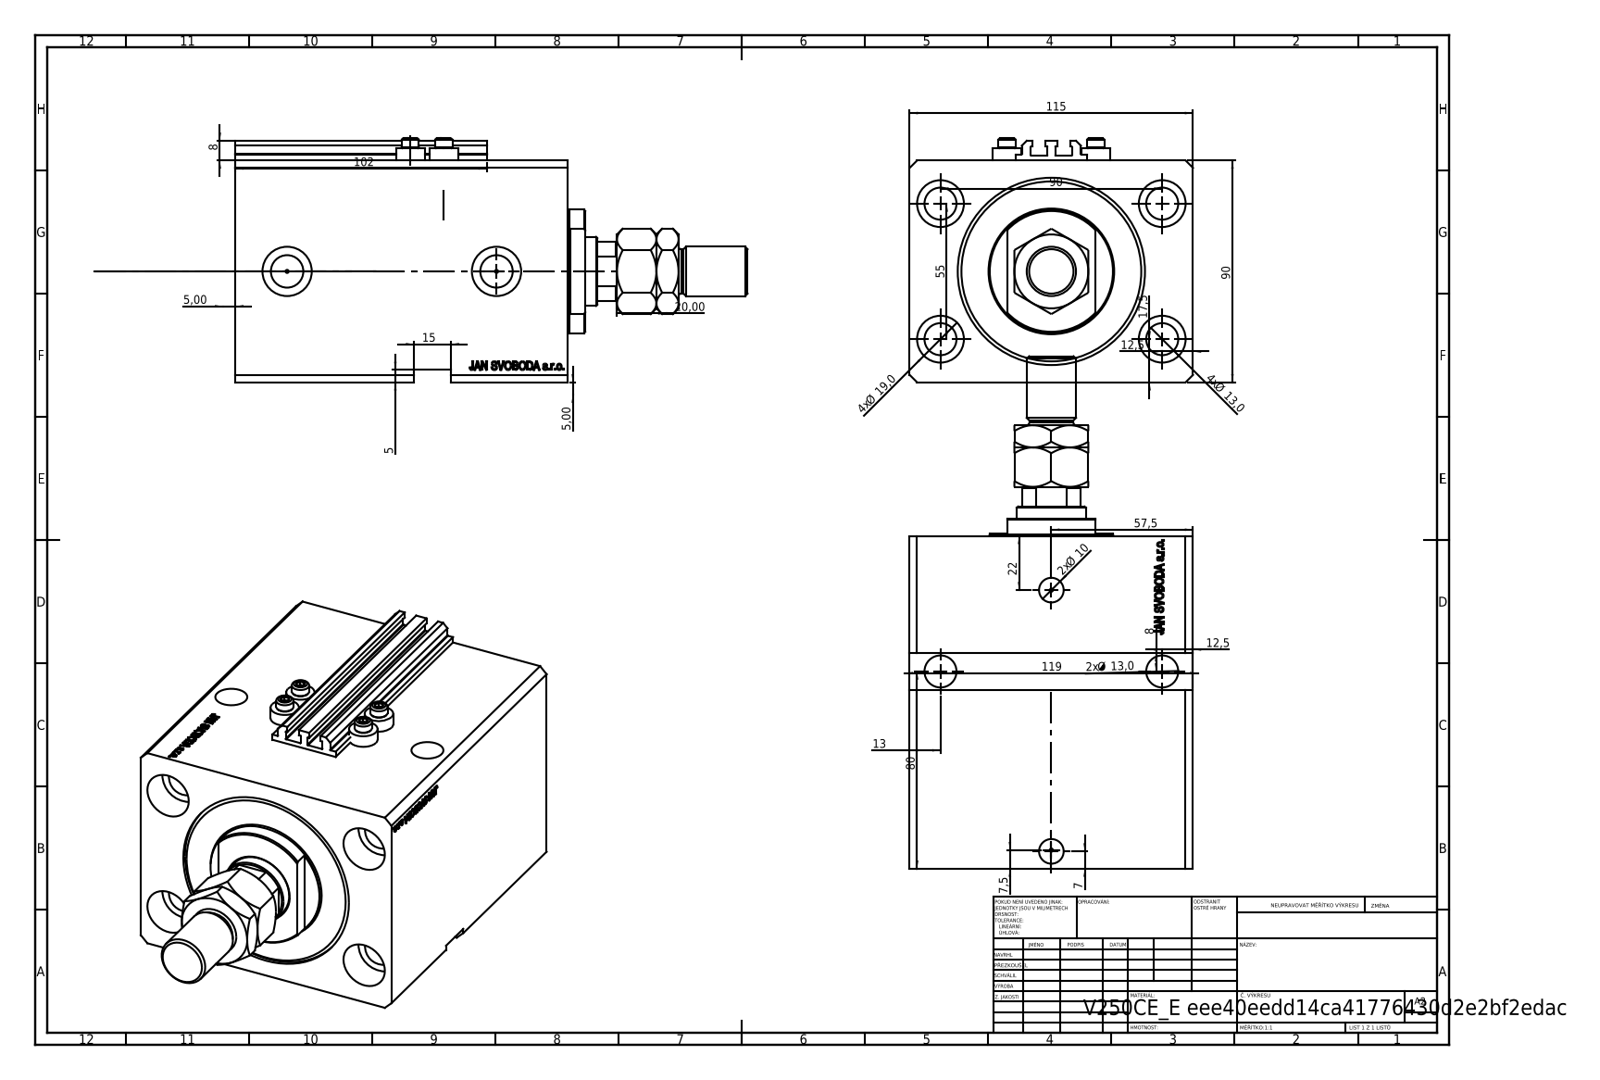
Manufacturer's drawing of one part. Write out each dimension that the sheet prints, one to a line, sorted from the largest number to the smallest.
119
115
102
90
90
80
57,5
55
22
20,00
4x Ø 19,0
17,5
15
4x Ø 13,0
2x Ø 13,0
13
12,5
12,5
2x Ø 10
8
8
7,5
7
5,00
5,00
5
